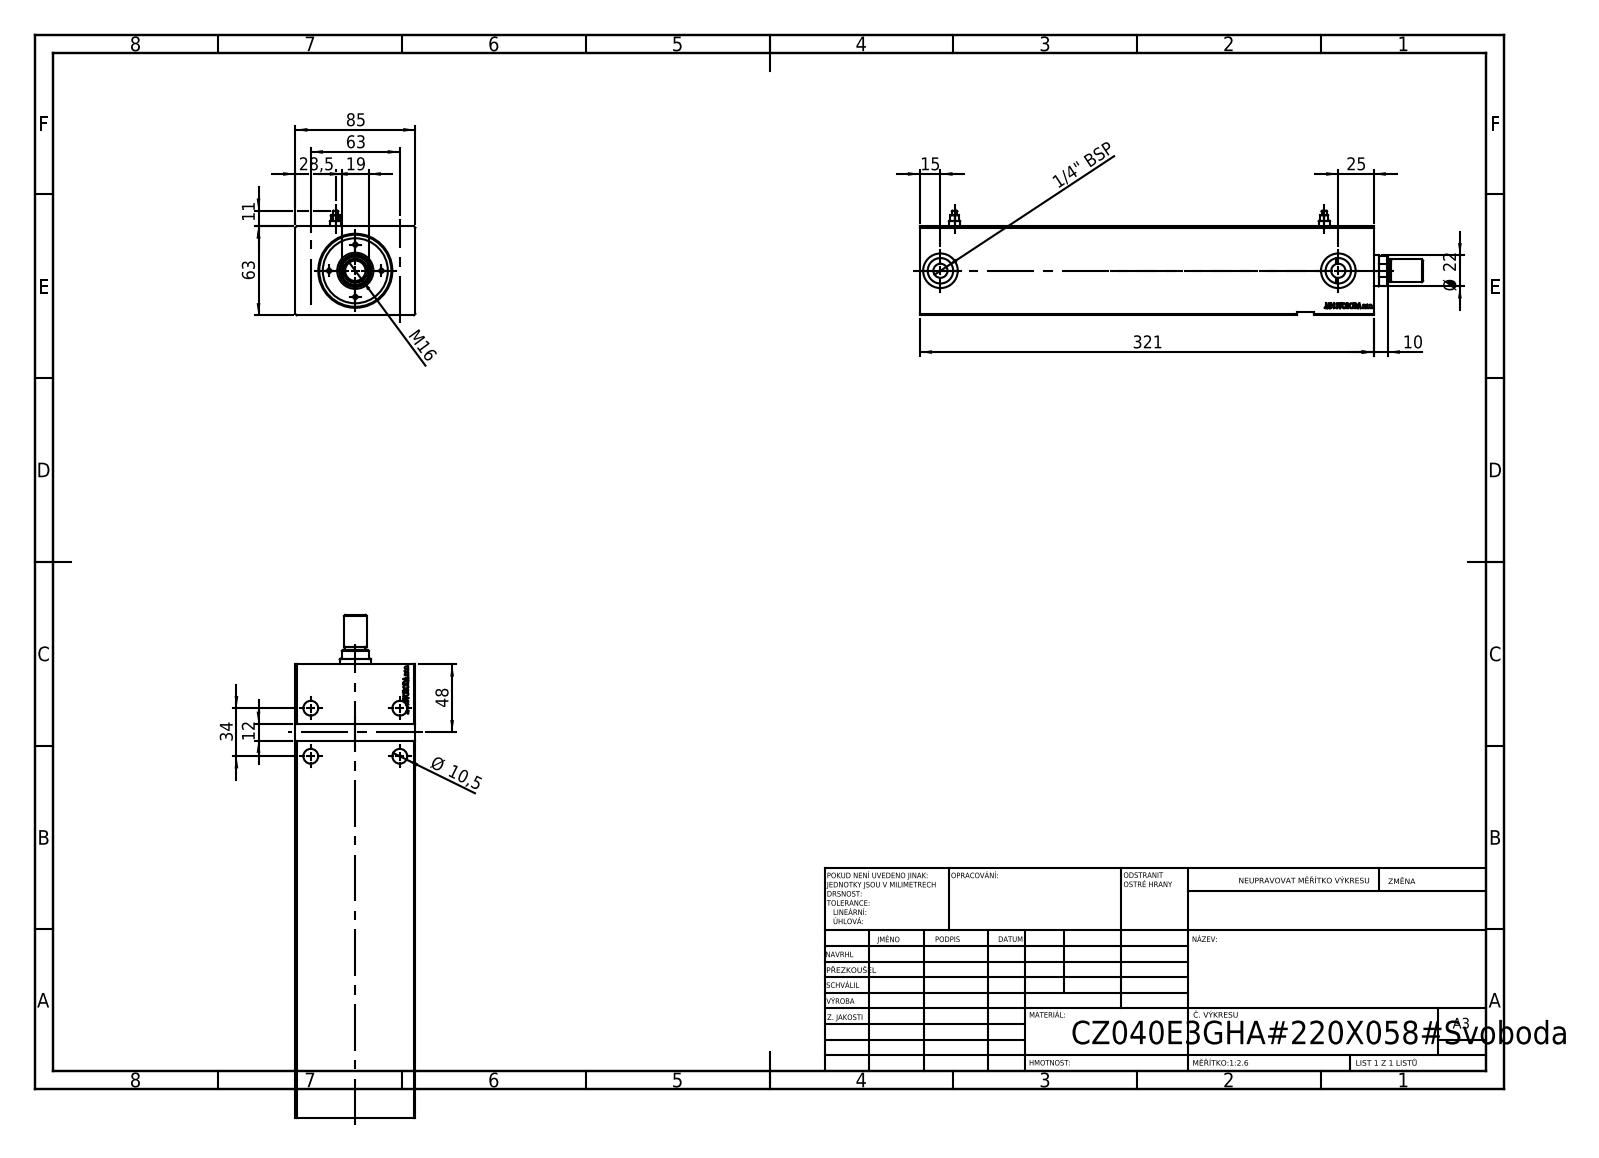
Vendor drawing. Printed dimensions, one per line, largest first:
321
85
63
63
48
34
28,5
25
Ø 22
19
M16
15
12
11
Ø 10,5
10
1/4" BSP
